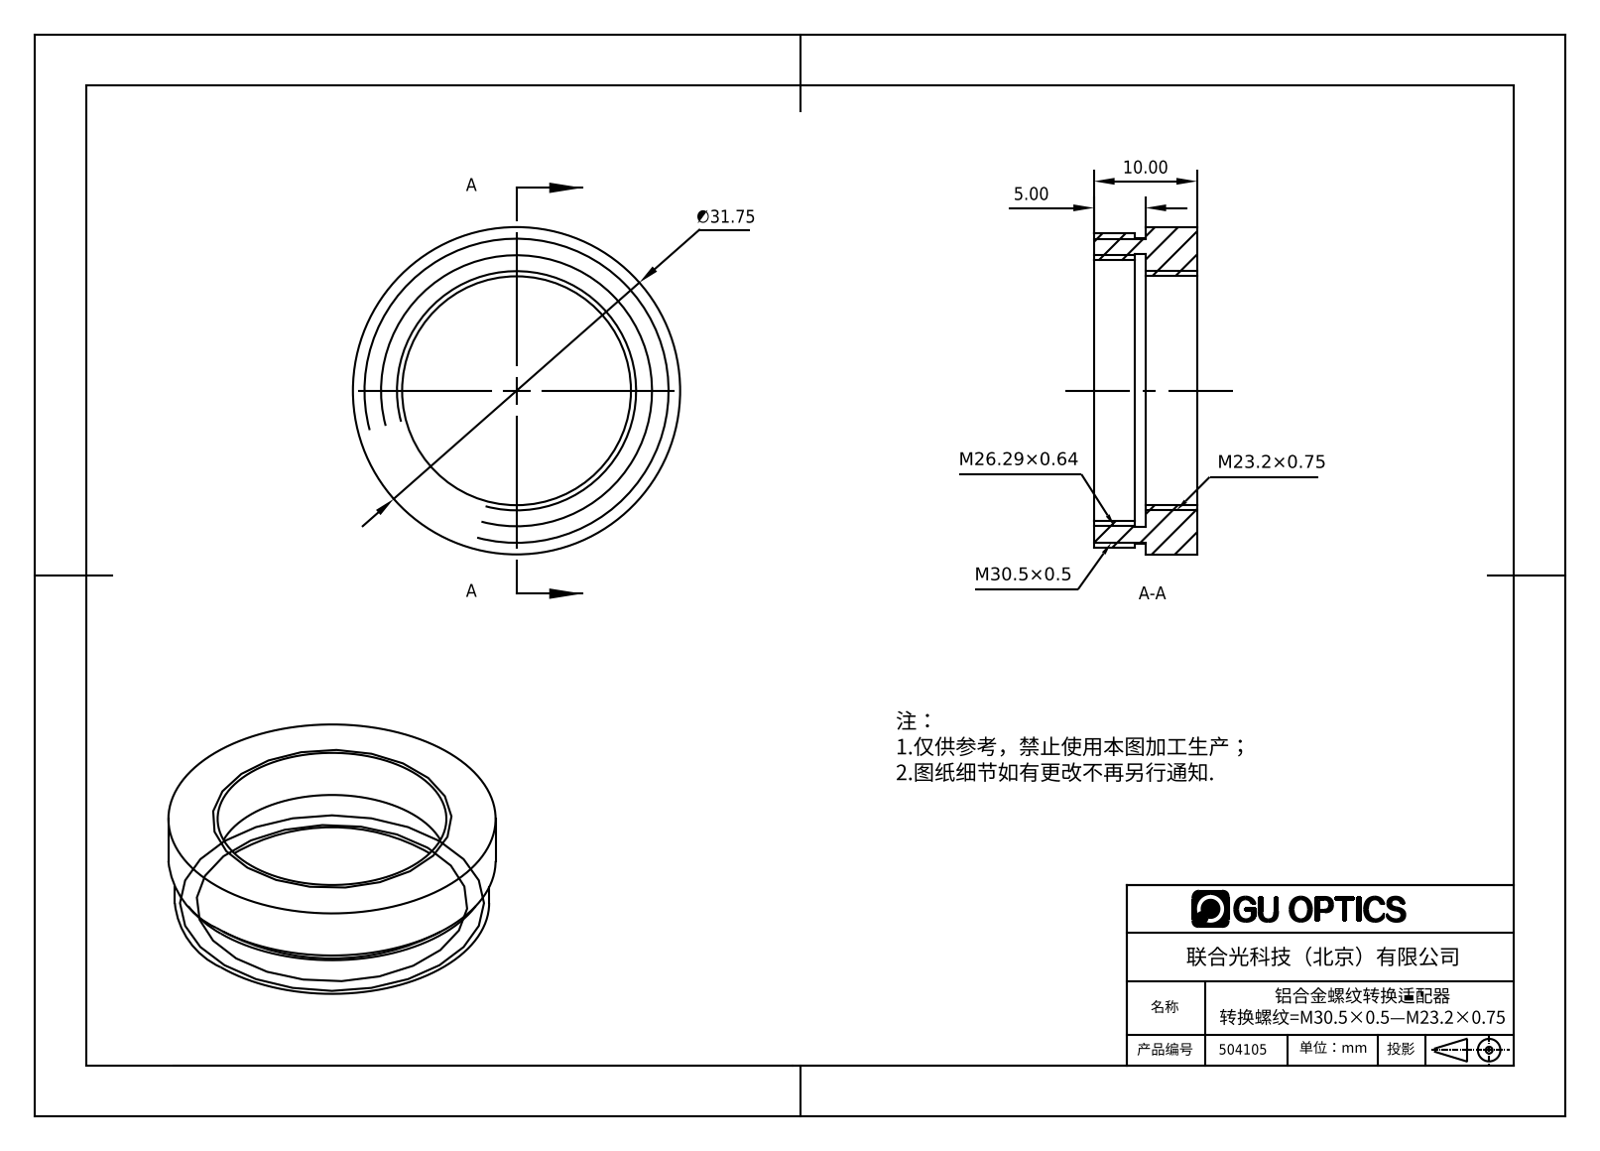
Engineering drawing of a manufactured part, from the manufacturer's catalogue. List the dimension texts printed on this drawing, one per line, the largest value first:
∅31.75
10.00
5.00
